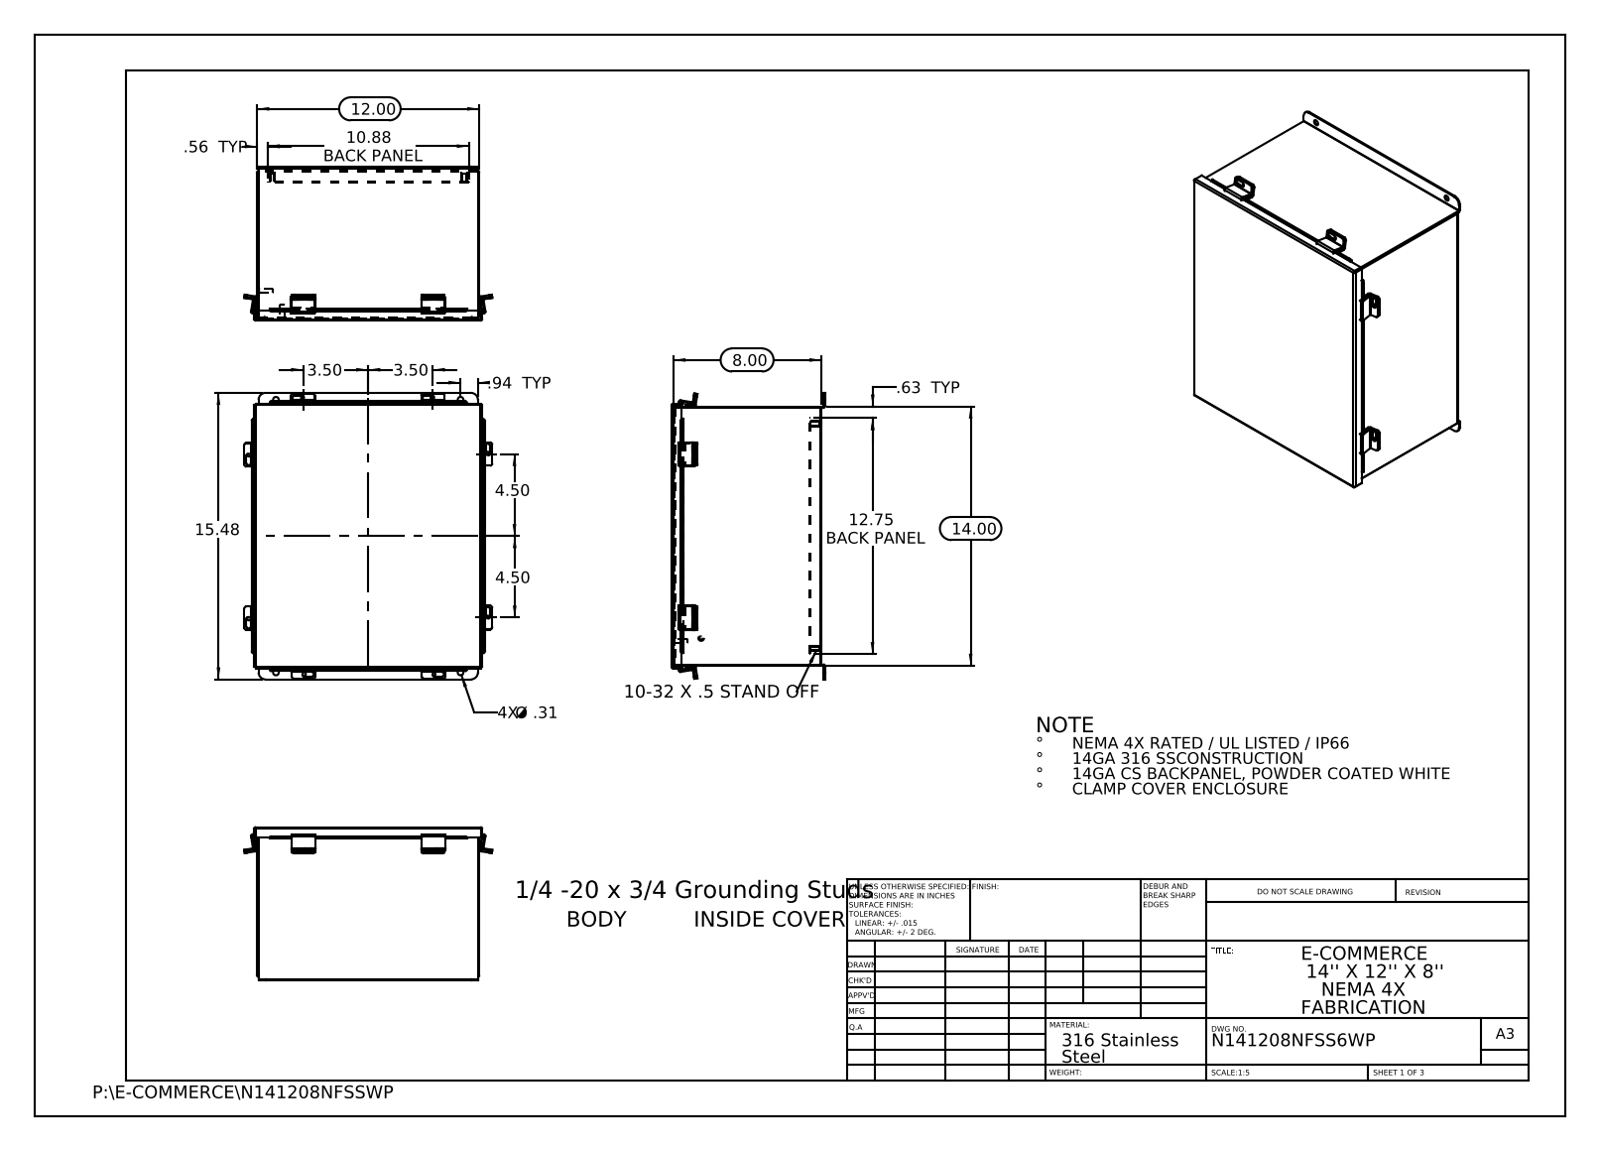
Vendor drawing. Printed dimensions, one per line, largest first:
15.48
14.00
12.75 BACK PANEL
12.00
10.88 BACK PANEL
8.00
4.50
4.50
3.50
3.50
.94 TYP
.63 TYP
.56 TYP
4X Ø .31
